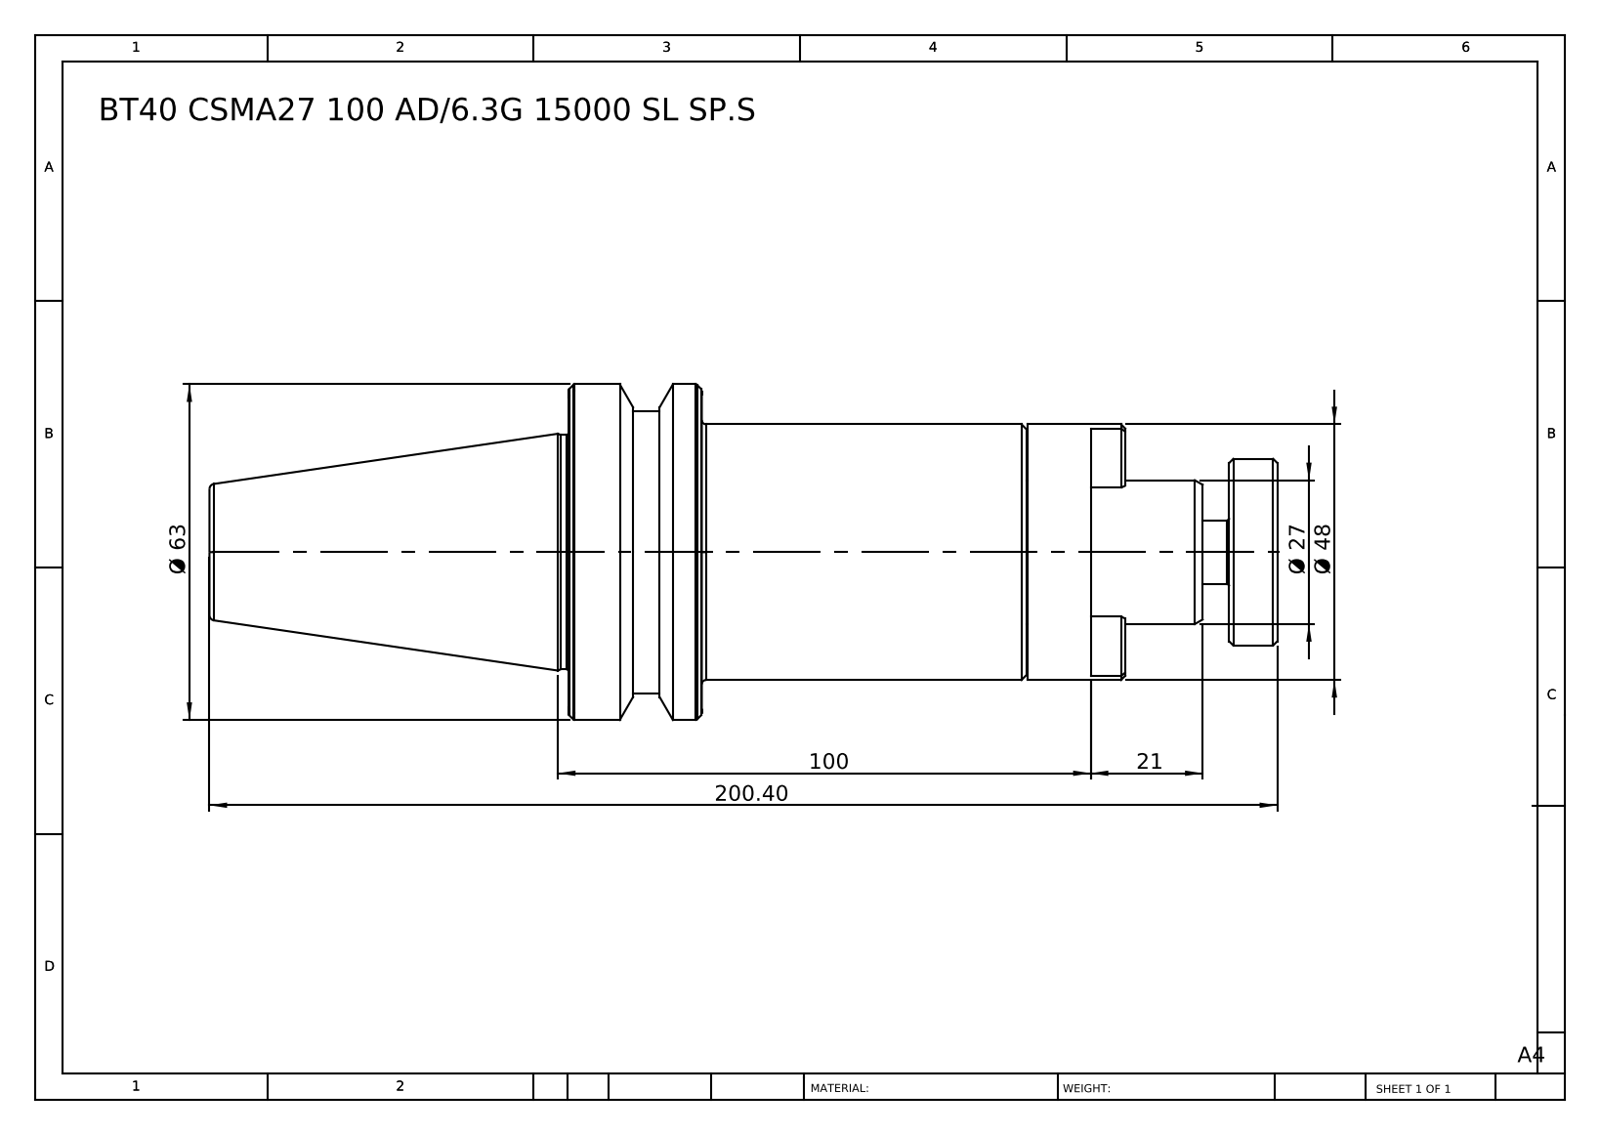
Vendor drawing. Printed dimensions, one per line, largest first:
200.40
100
Ø 63
Ø 48
Ø 27
21
